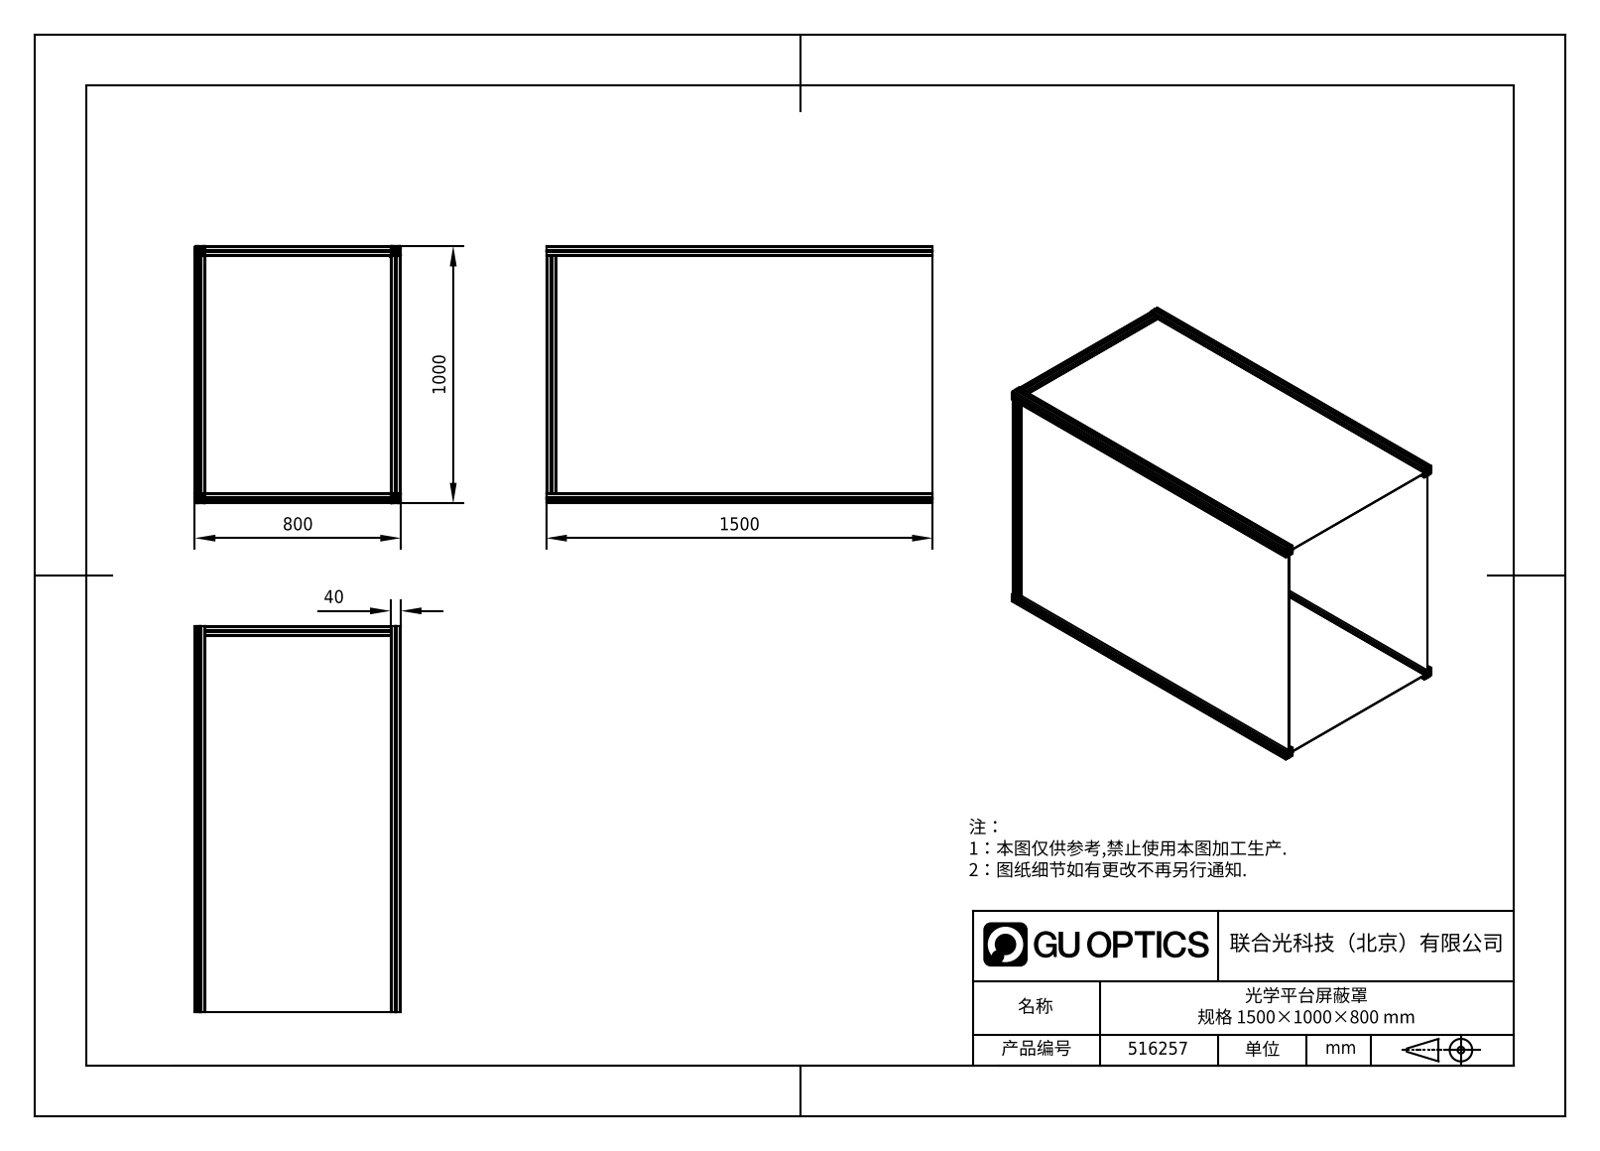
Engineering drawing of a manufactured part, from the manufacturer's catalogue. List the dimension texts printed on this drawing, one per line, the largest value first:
1500
1000
800
40
